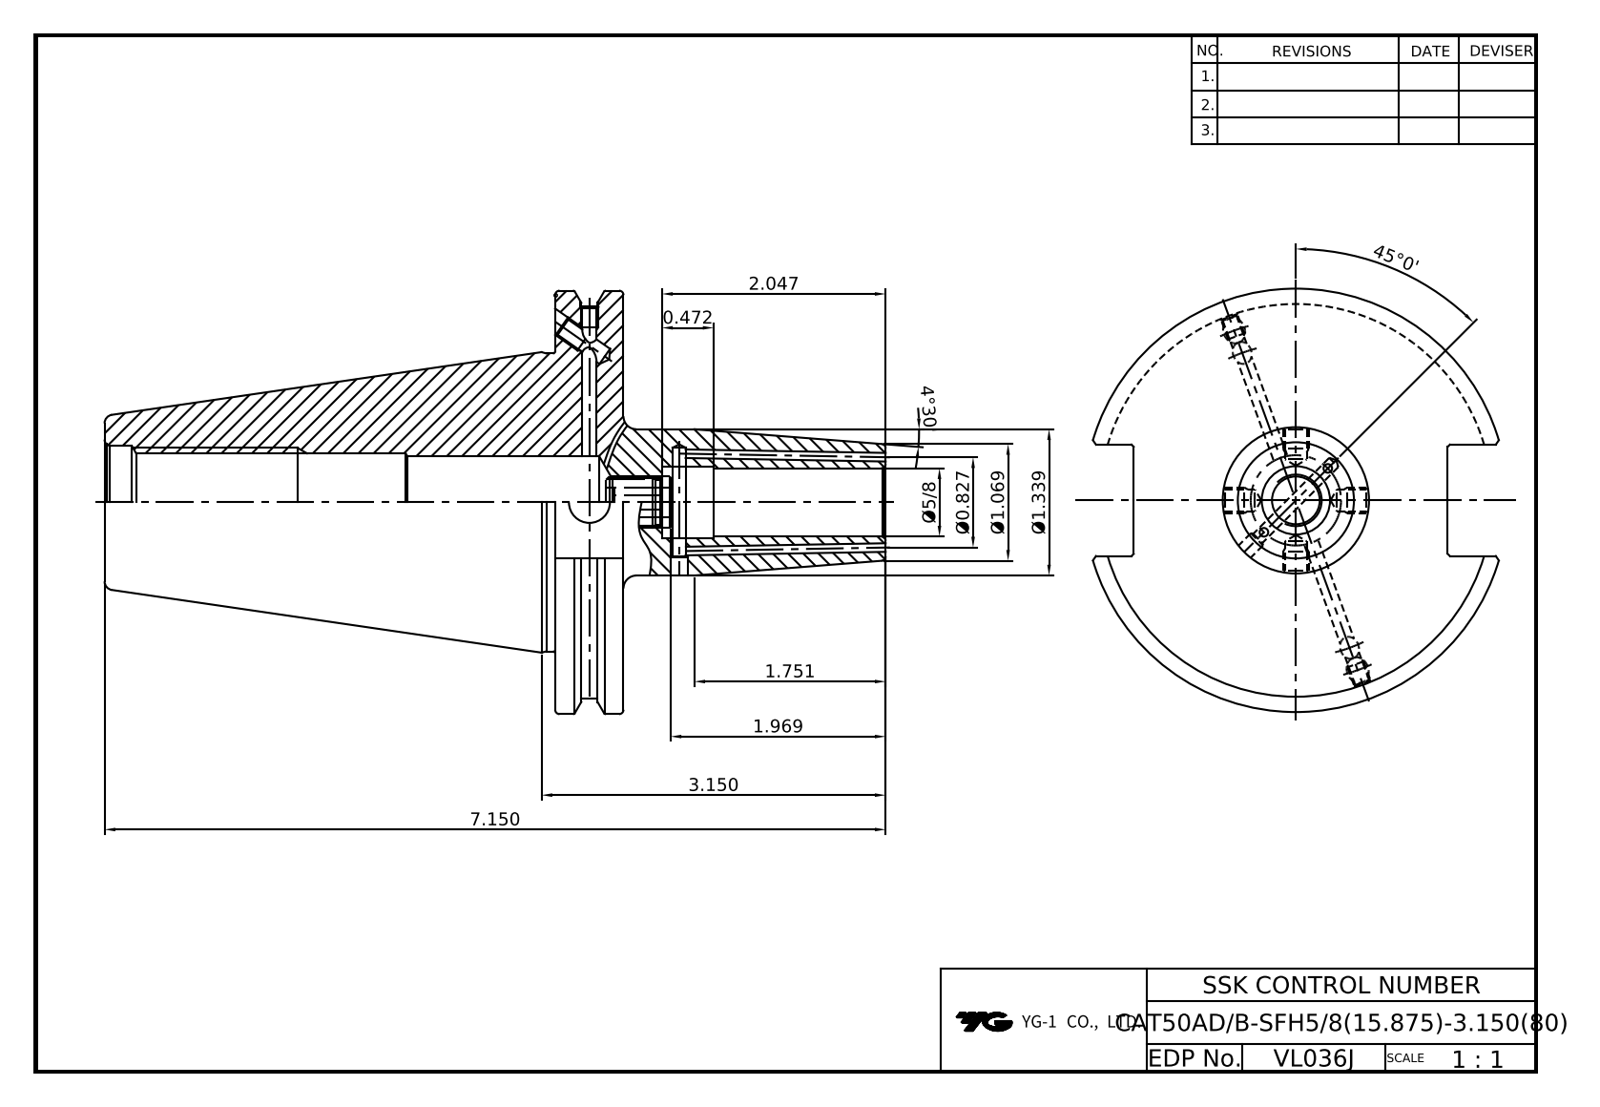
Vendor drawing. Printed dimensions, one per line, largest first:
45°0'
7.150
4°30'
3.150
2.047
1.969
1.751
Ø1.339
Ø1.069
Ø0.827
Ø5/8
0.472
